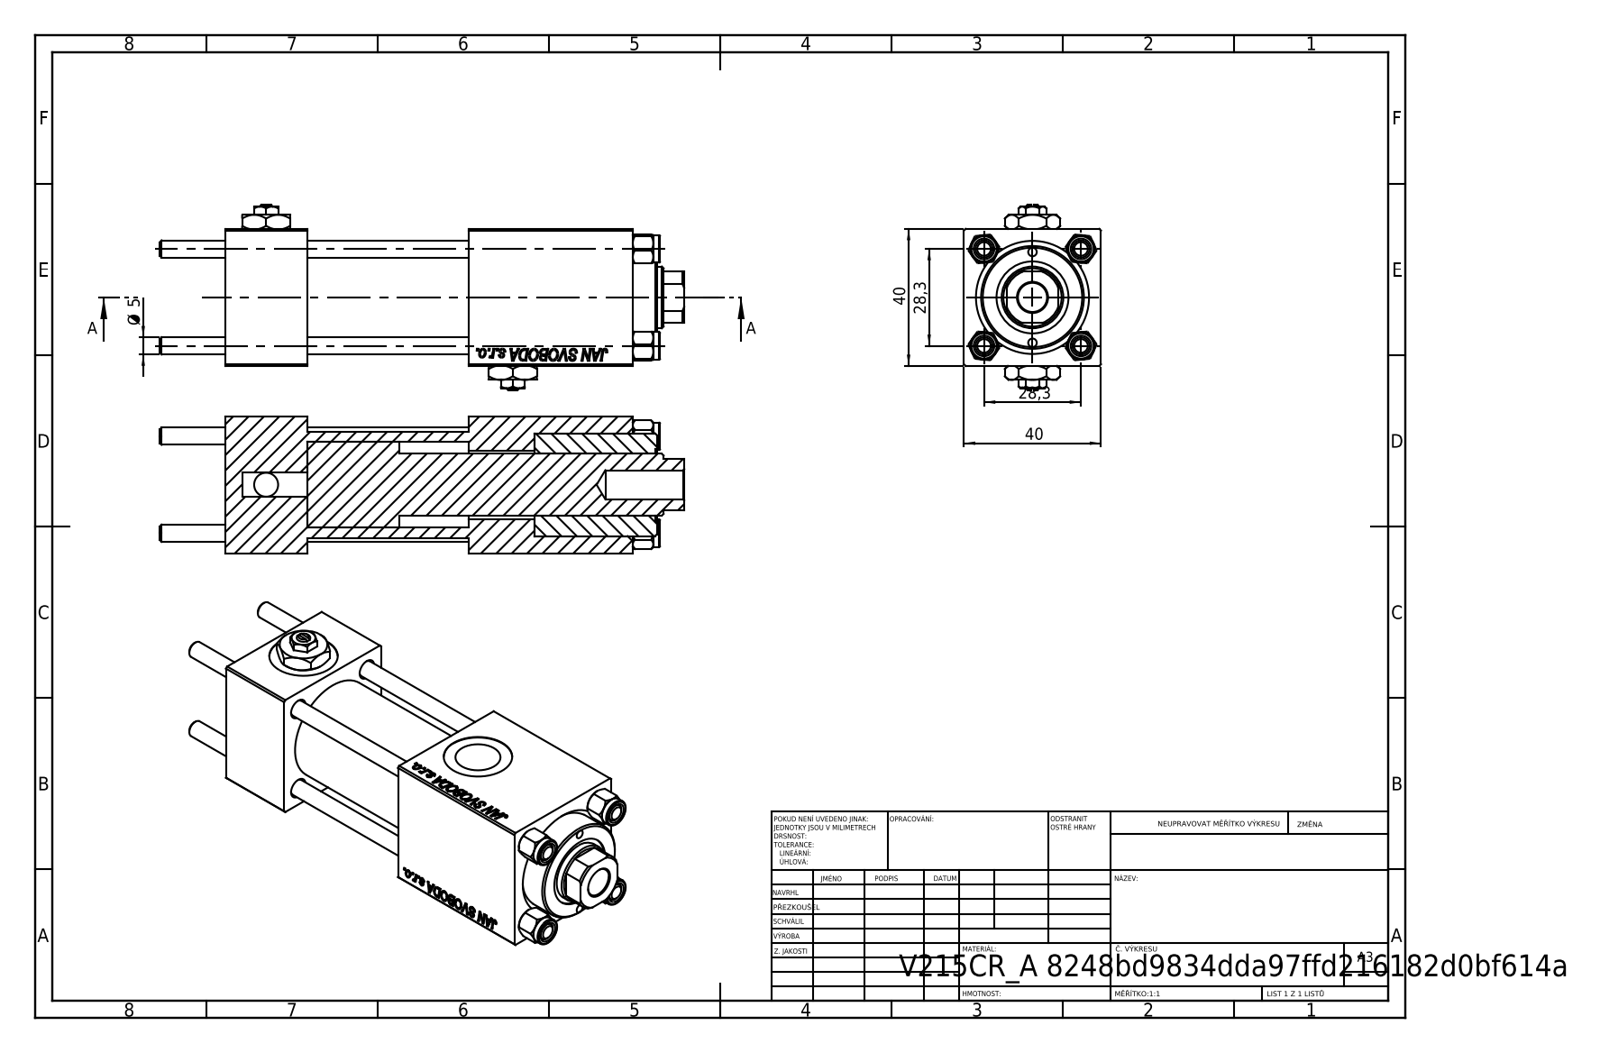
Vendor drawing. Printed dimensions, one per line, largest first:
40
40
28,3
28,3
Ø 5
